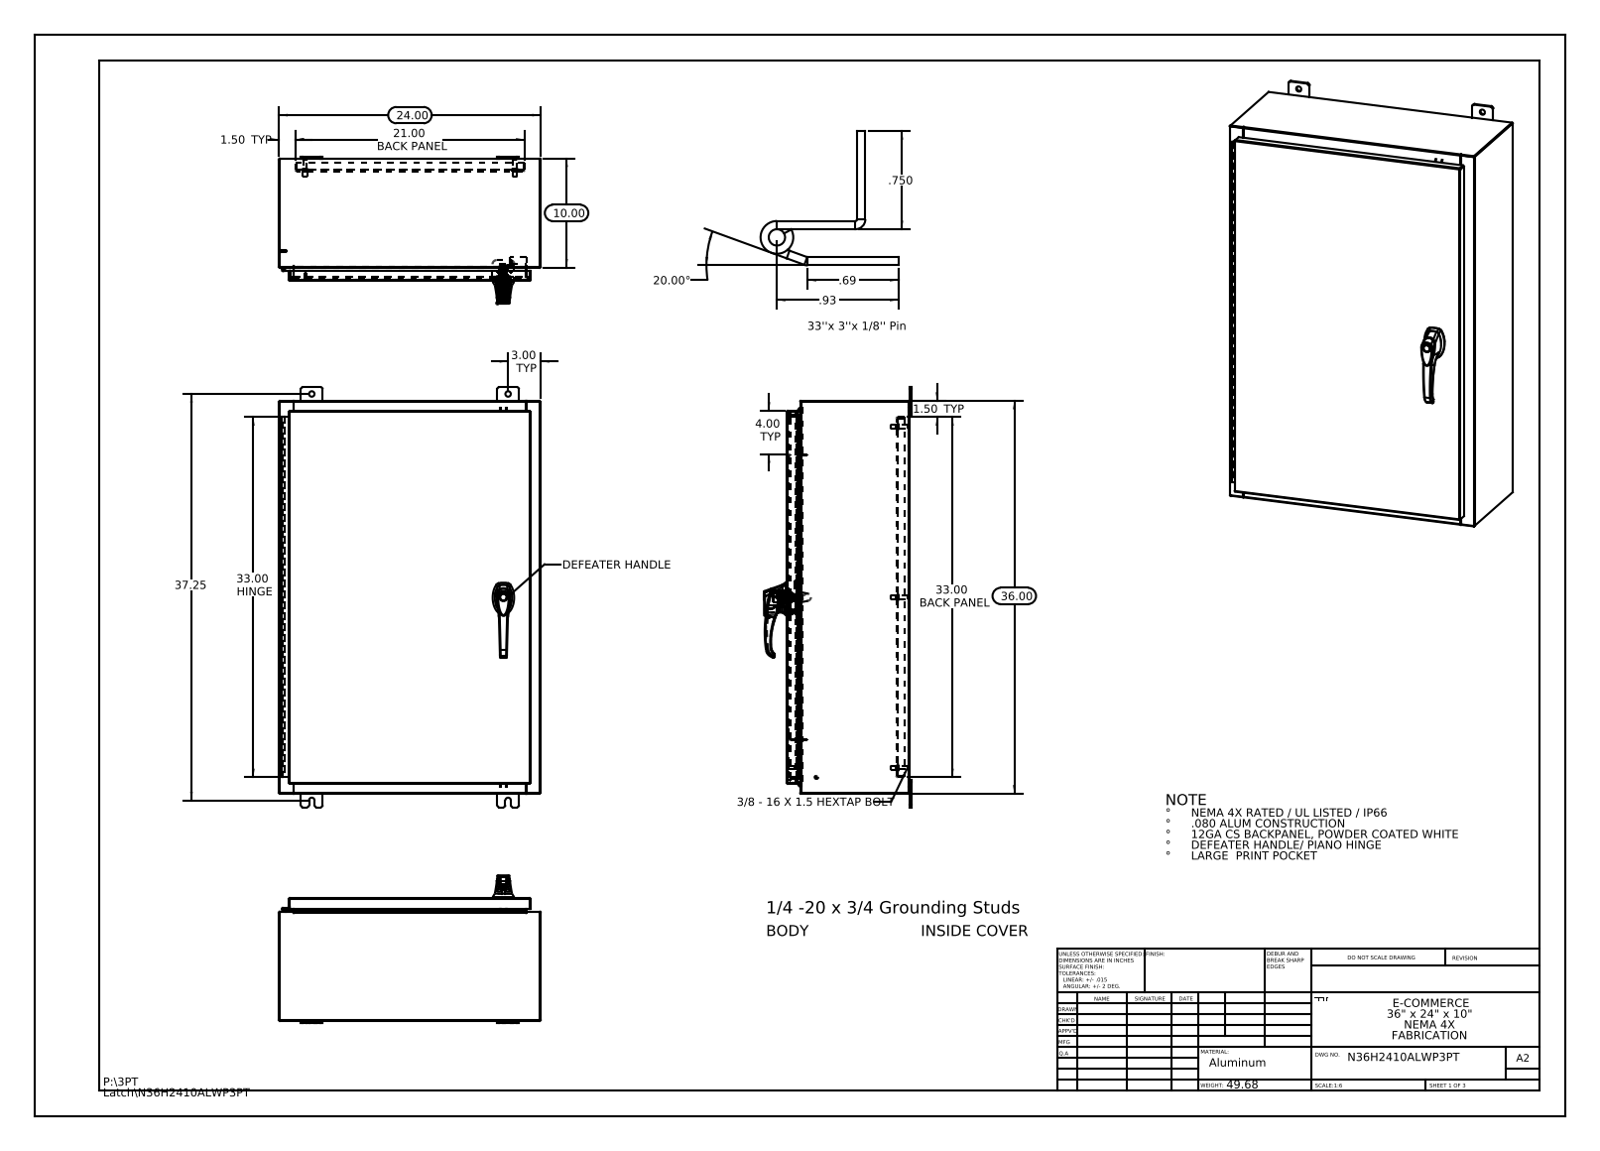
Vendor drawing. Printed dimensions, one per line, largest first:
37.25
36.00
33.00 HINGE
33.00 BACK PANEL
24.00
21.00 BACK PANEL
20.00°
10.00
4.00 TYP
3.00 TYP
1.50 TYP
1.50 TYP
.93
.750
.69
